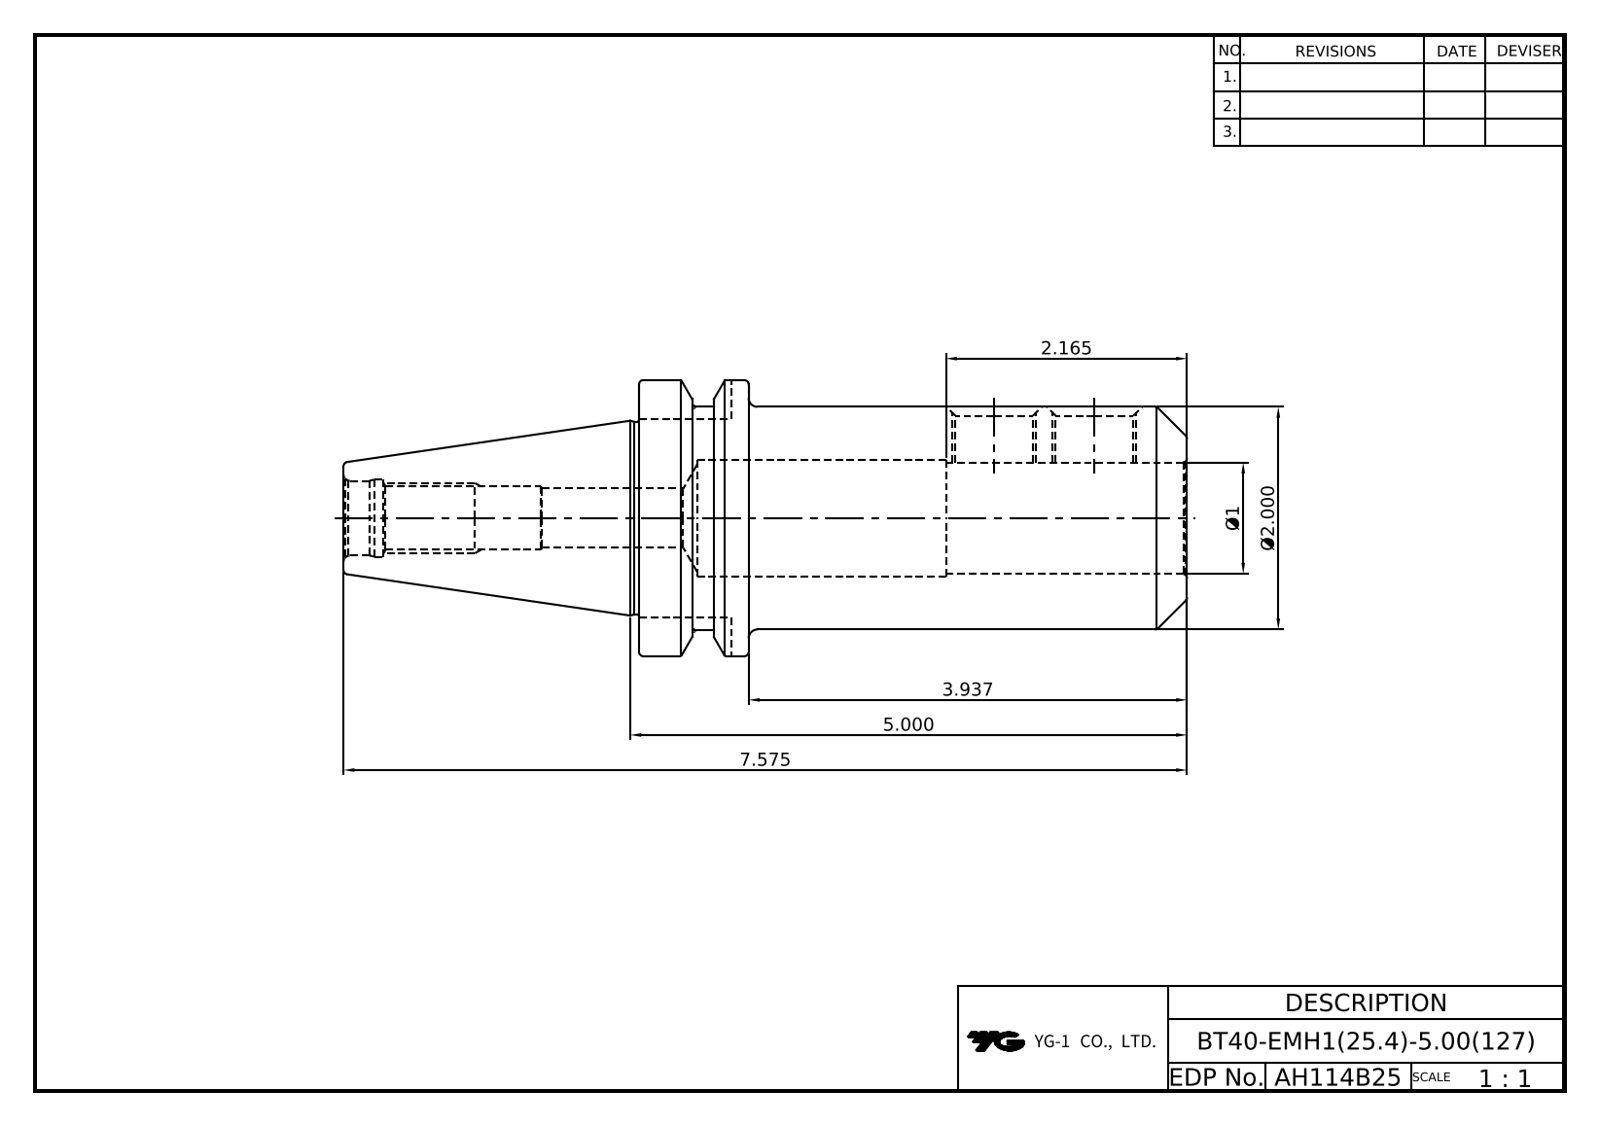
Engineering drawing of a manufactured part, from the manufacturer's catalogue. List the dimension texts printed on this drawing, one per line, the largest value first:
7.575
5.000
3.937
2.165
Ø2.000
Ø1
